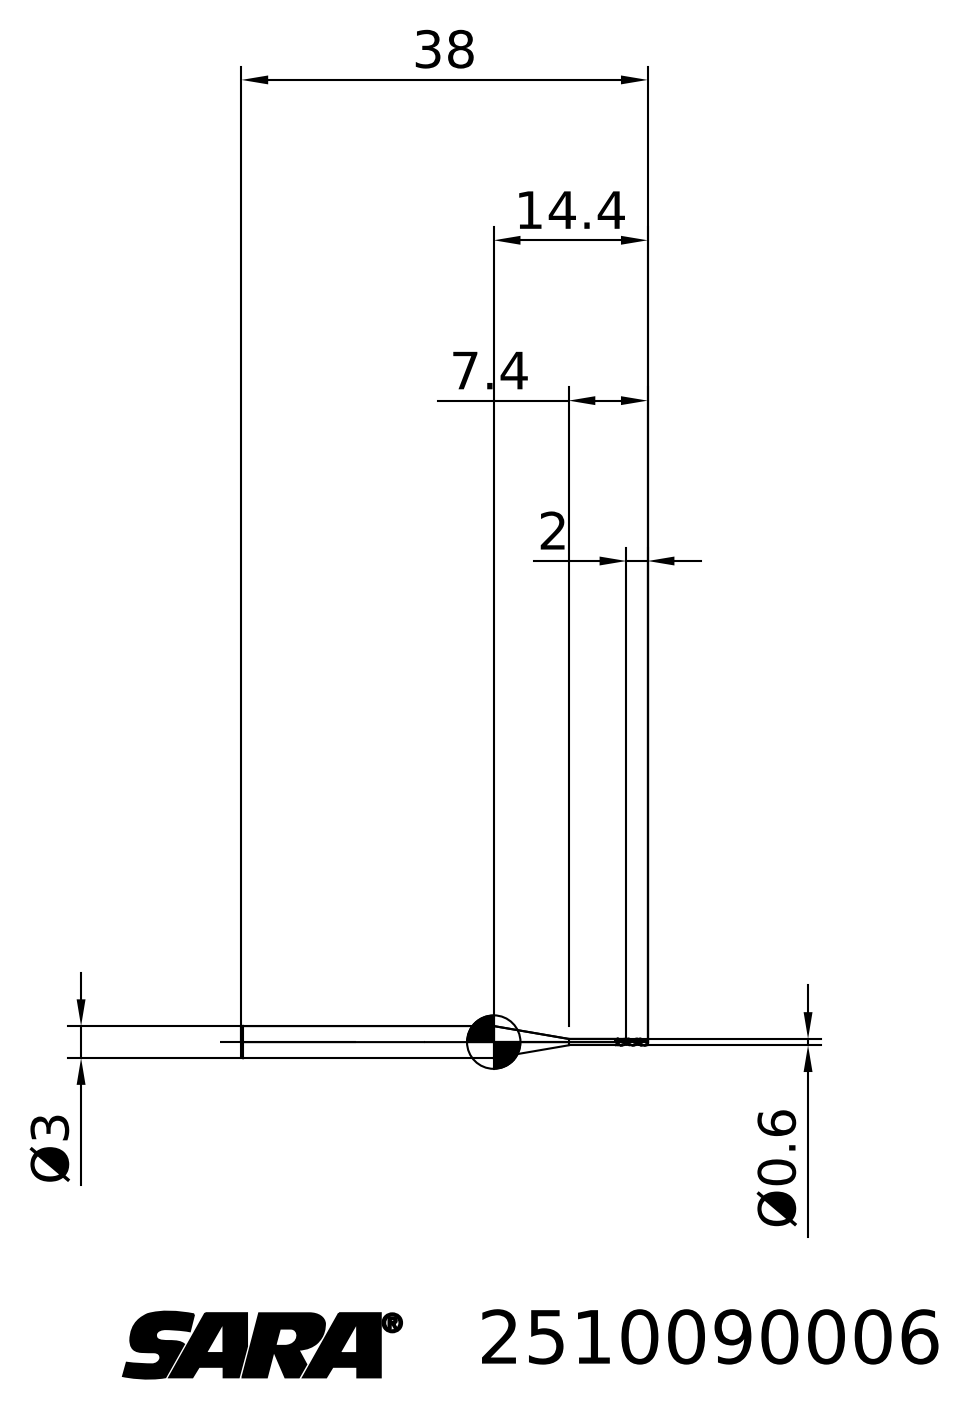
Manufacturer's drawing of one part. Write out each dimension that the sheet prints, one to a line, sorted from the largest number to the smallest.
38
14.4
7.4
Ø3
2
Ø0.6
